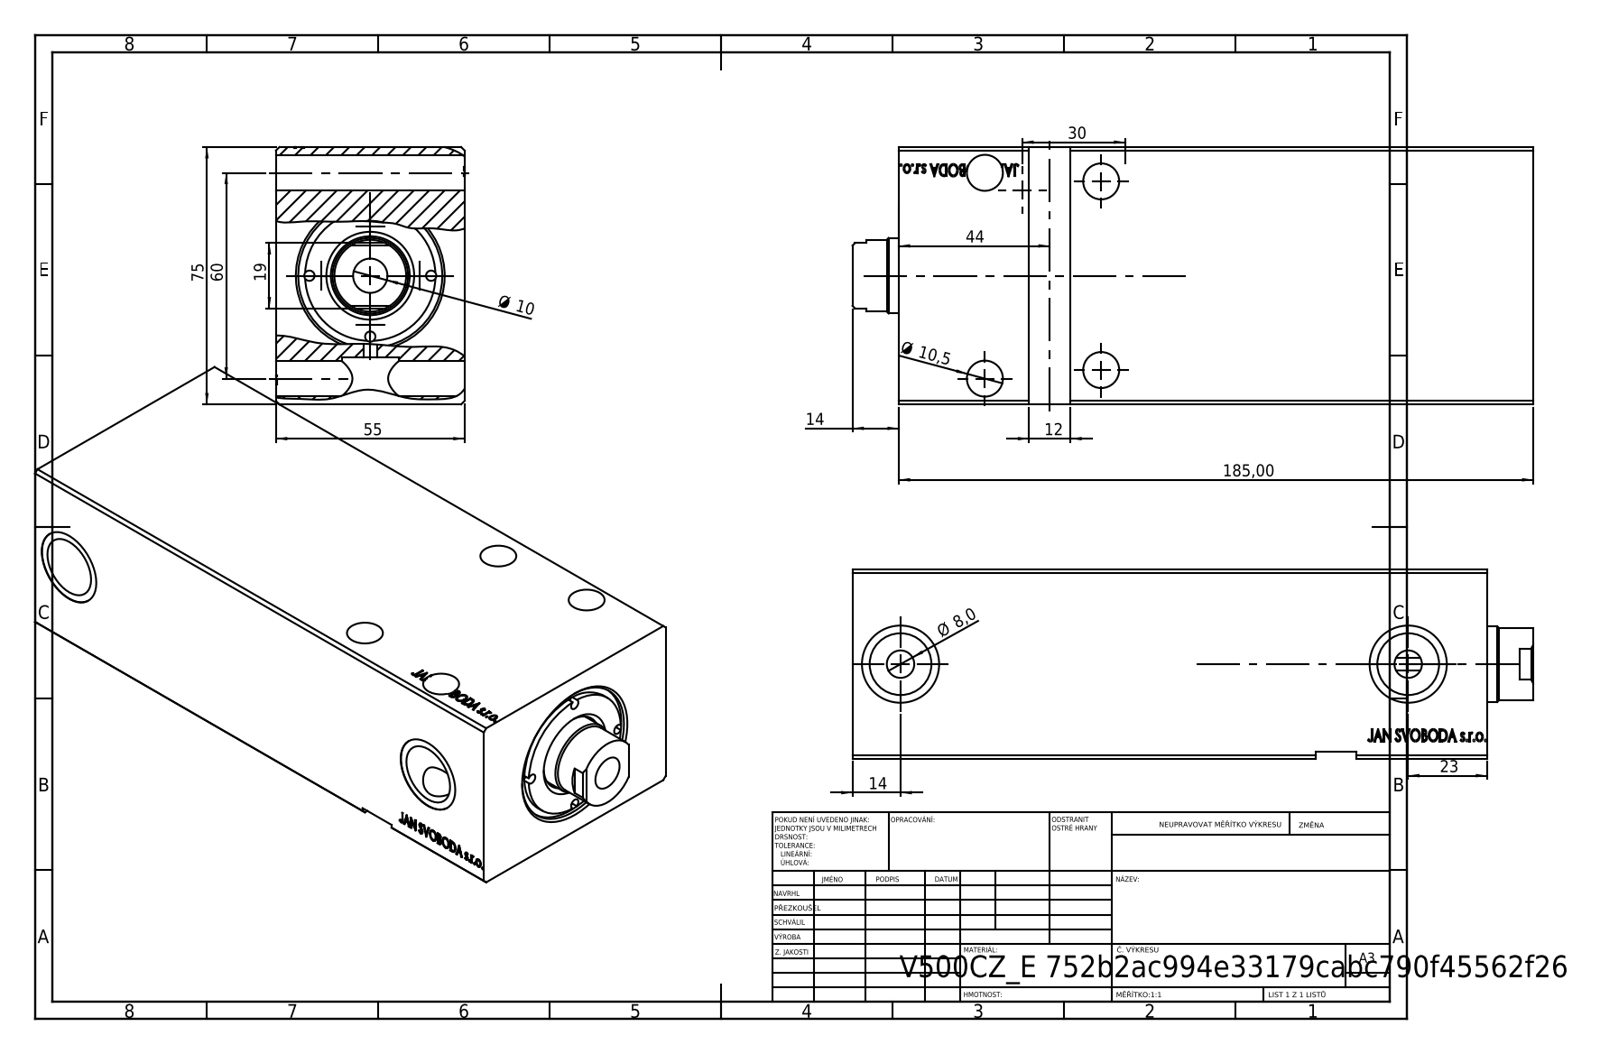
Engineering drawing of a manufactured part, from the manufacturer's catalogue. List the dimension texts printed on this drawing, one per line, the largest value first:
185,00
75
60
55
44
30
23
19
14
14
12
Ø 10,5
Ø 10
Ø 8,0
